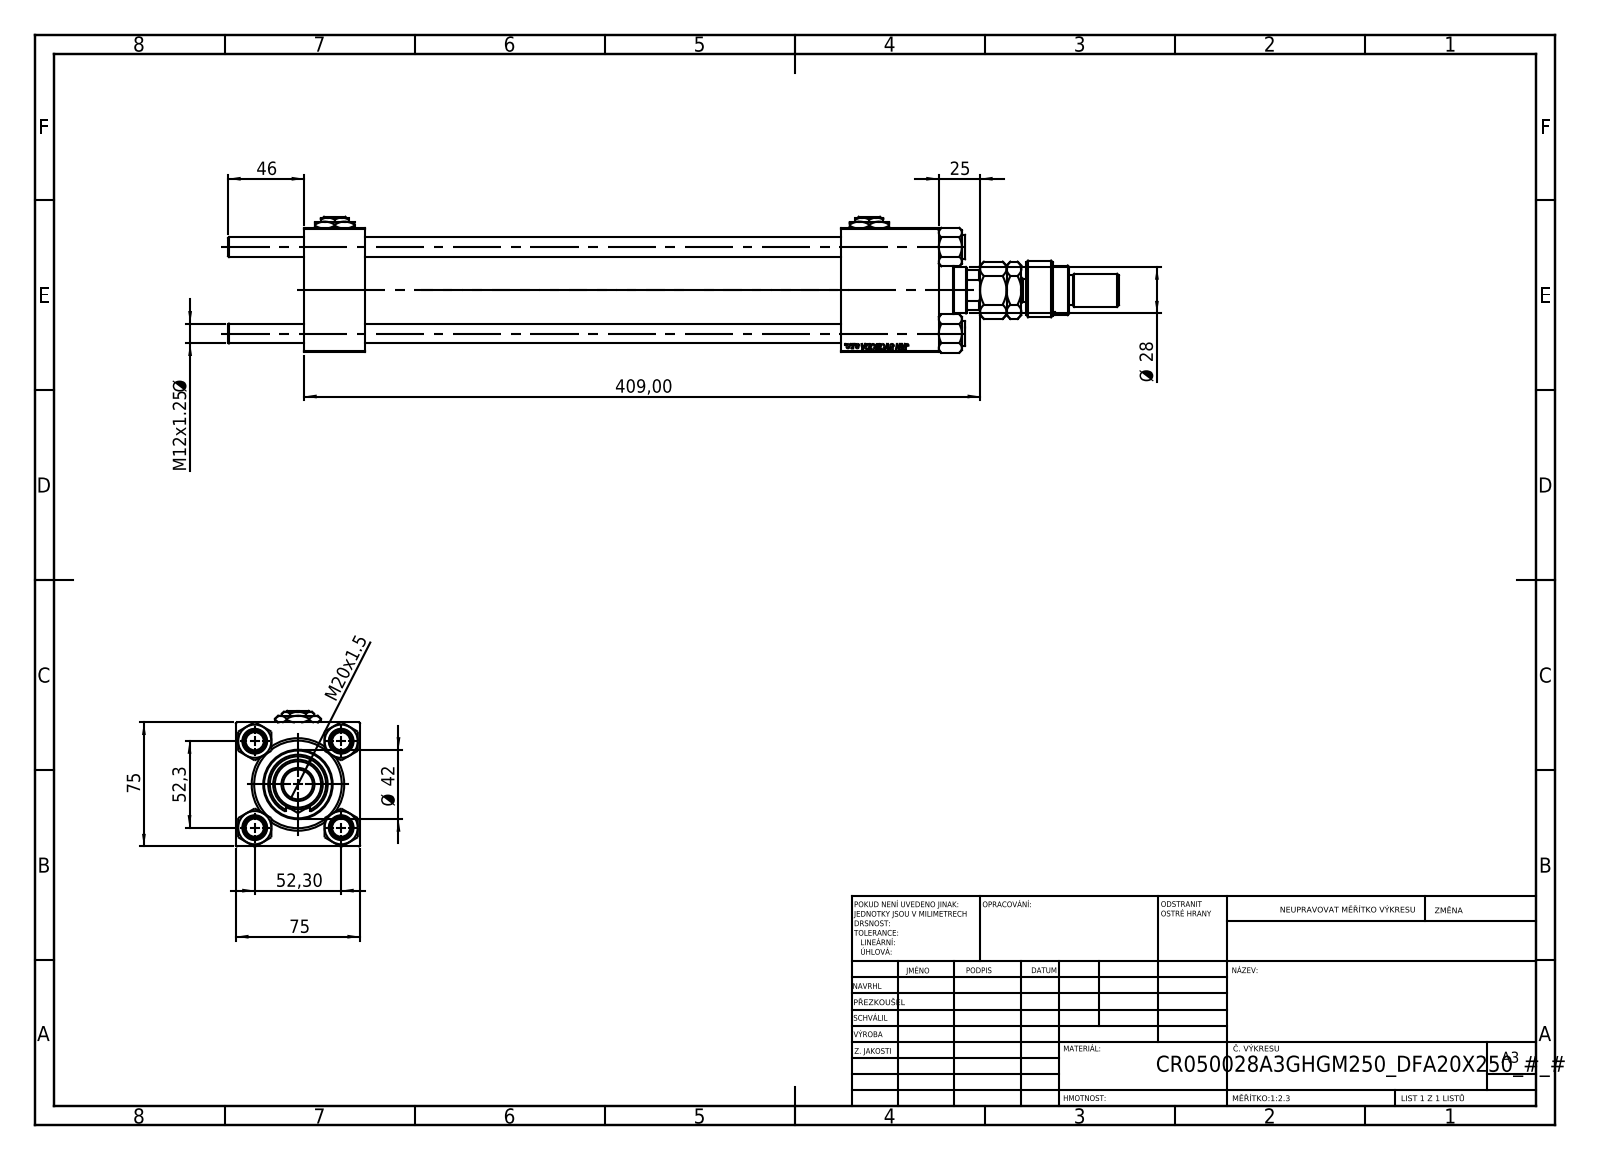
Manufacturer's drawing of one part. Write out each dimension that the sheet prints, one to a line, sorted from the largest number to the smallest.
409,00
75
75
52,3
52,30
46
Ø 42
Ø 28
25
M20x1.5
M12x1.25 Ø
